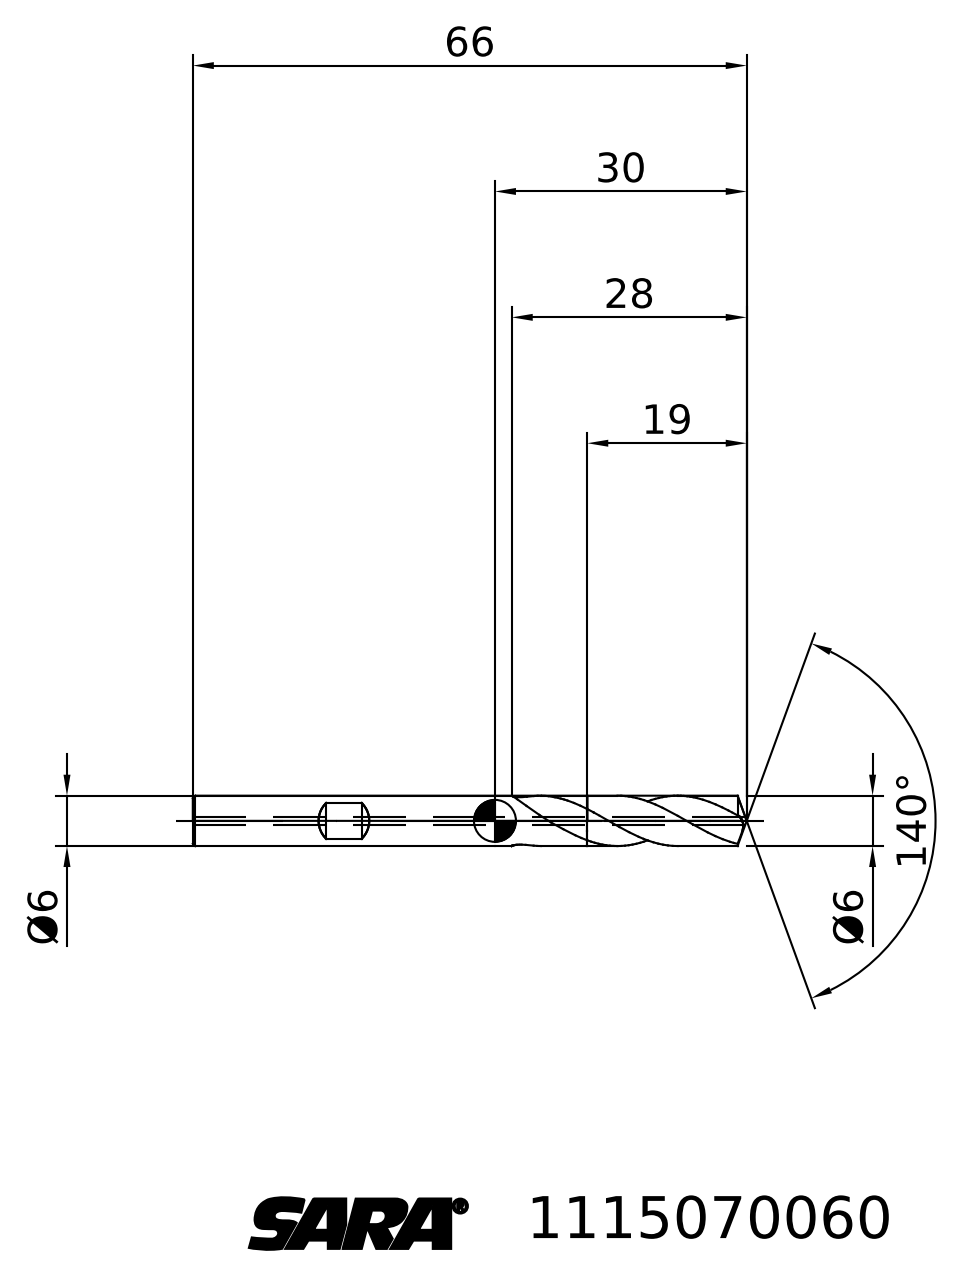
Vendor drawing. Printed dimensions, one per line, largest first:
140°
66
30
28
19
Ø6
Ø6
